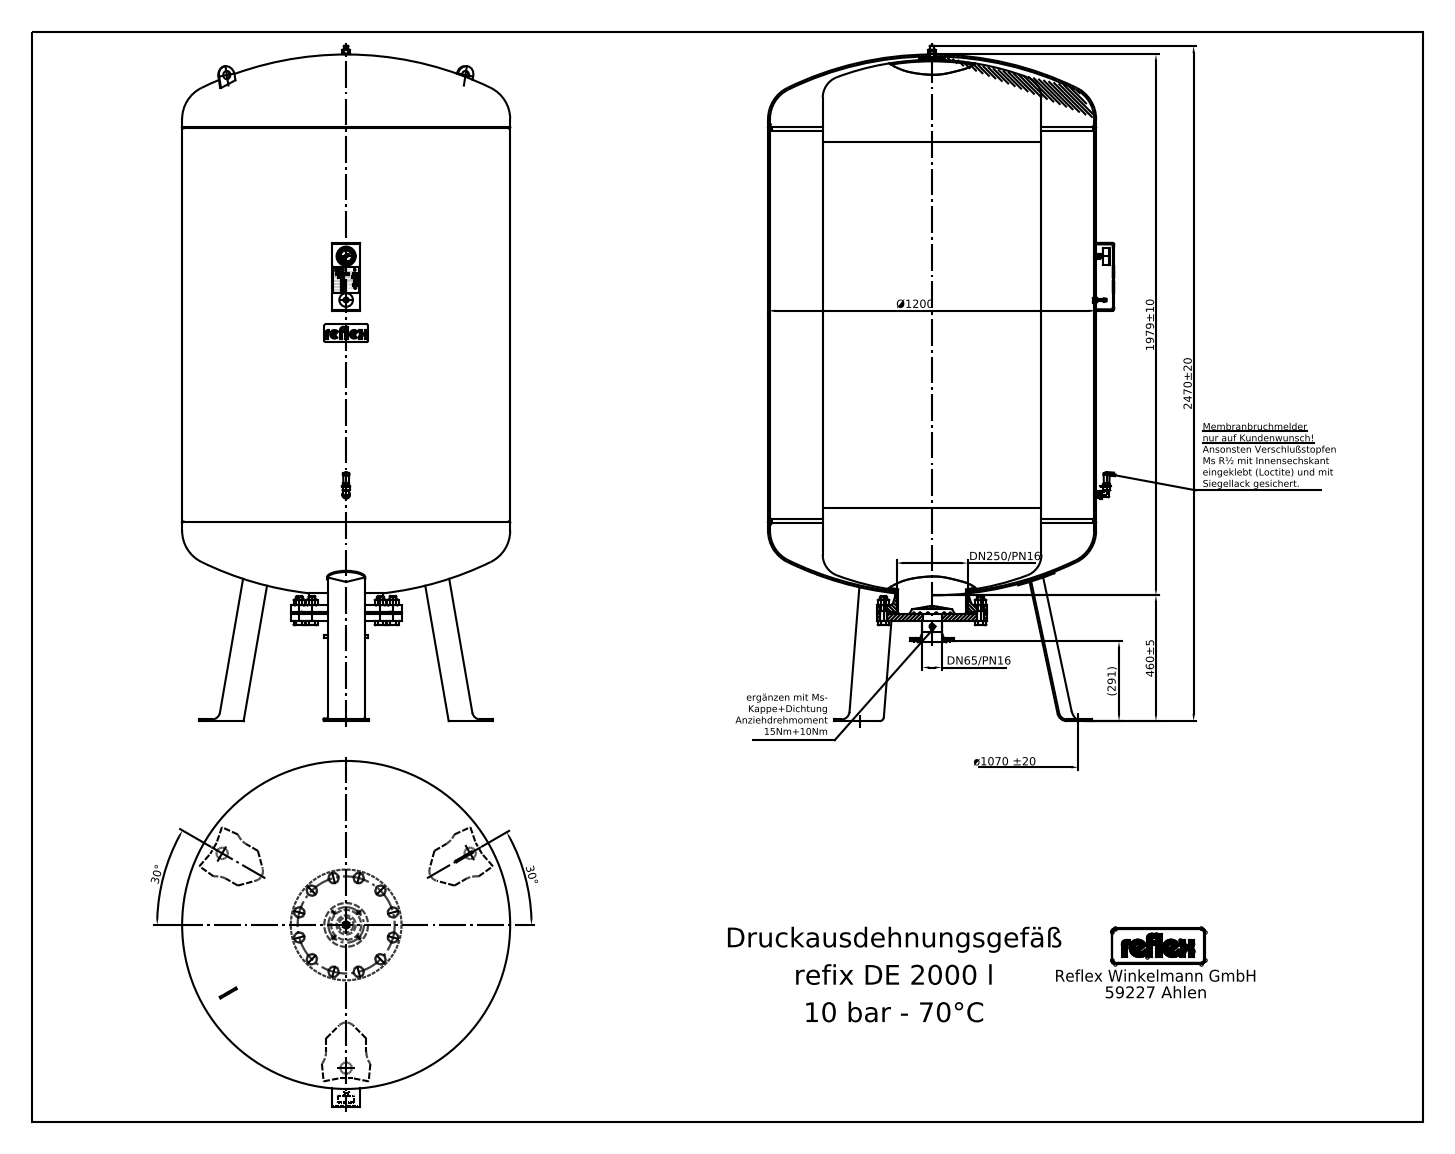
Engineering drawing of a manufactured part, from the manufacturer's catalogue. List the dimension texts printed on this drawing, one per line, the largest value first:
2470±20
1979±10
Ø1200
ø1070 ±20
460±5
(291)
DN250/PN16
DN65/PN16
30°
30°
